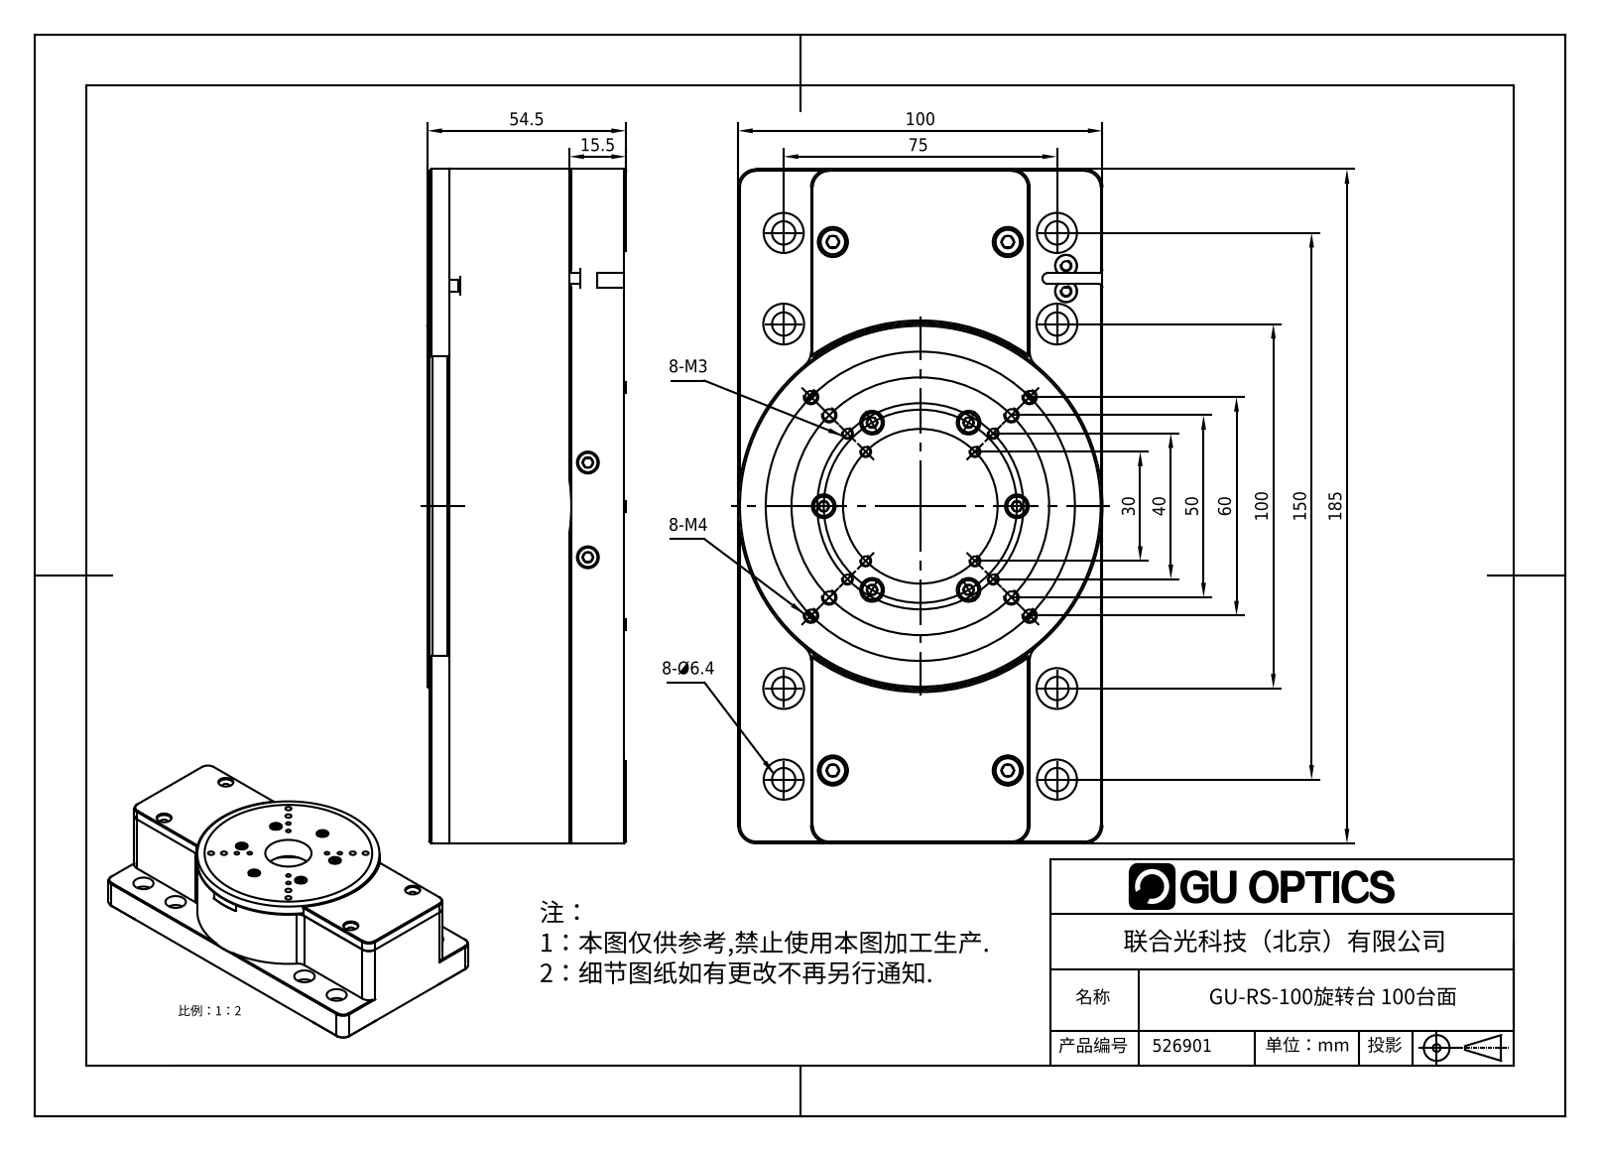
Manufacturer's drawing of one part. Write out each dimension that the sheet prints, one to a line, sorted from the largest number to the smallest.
185
150
100
100
75
60
54.5
50
40
30
15.5
